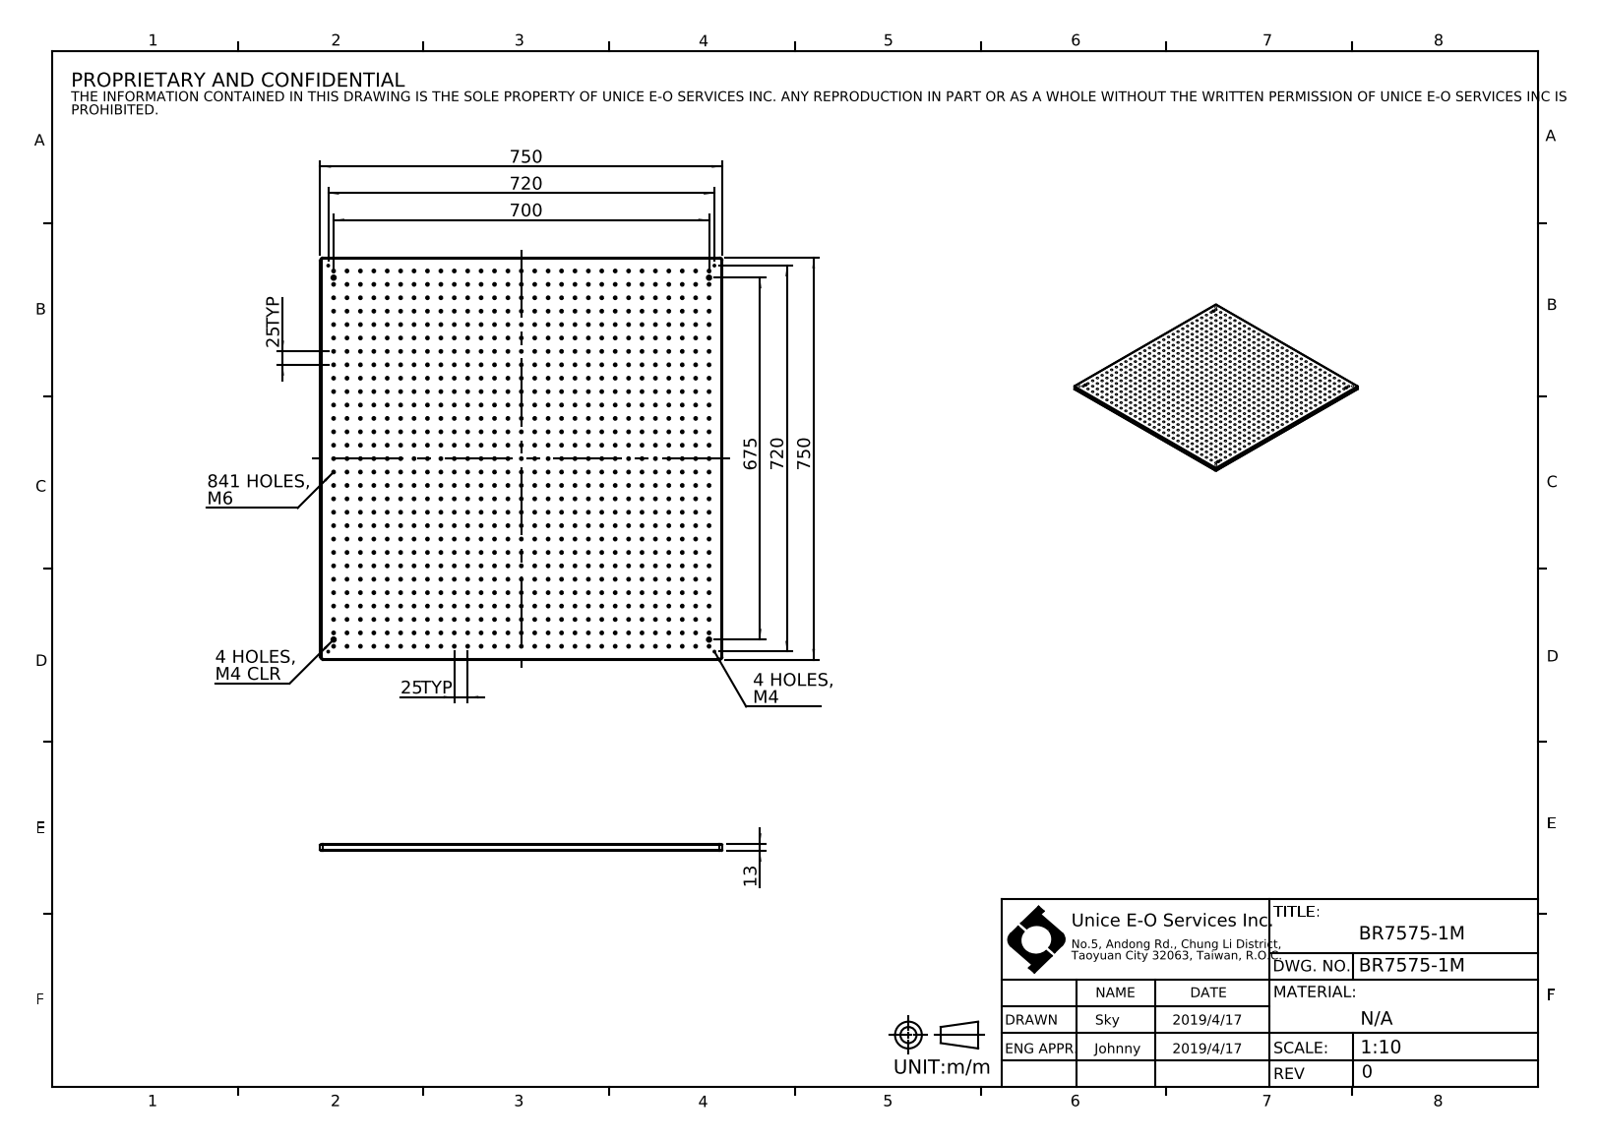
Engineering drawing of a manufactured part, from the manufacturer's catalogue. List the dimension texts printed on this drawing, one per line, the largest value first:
841 HOLES, M6
750
750
720
720
700
675
25 TYP
25 TYP
13
4 HOLES, M4
